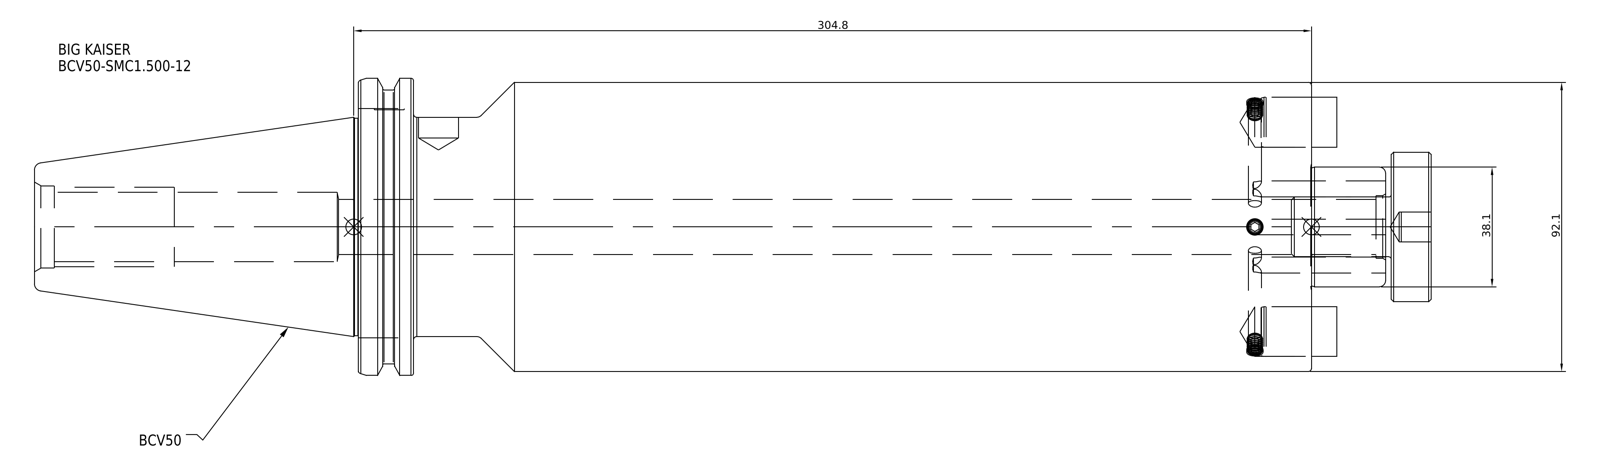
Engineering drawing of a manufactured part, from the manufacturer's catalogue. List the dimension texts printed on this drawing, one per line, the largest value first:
304.8
92.1
38.1
